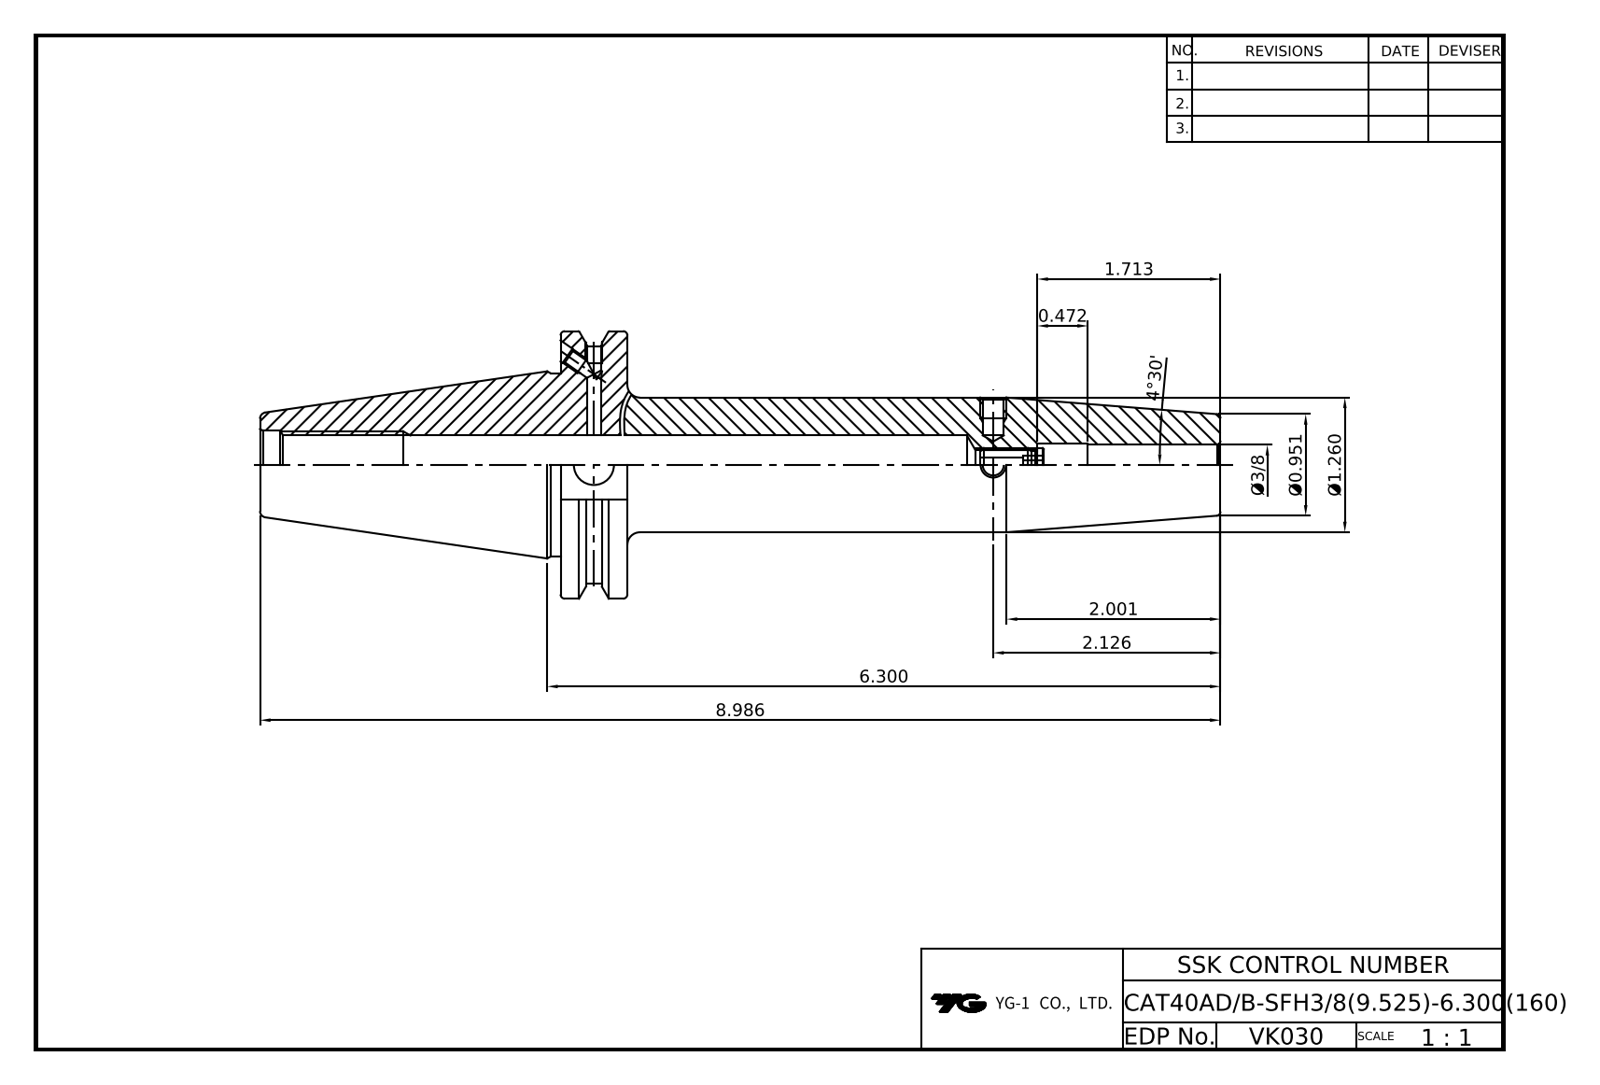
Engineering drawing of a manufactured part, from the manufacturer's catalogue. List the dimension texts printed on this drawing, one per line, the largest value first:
8.986
6.300
4°30'
2.126
2.001
1.713
Ø1.260
Ø0.951
0.472
